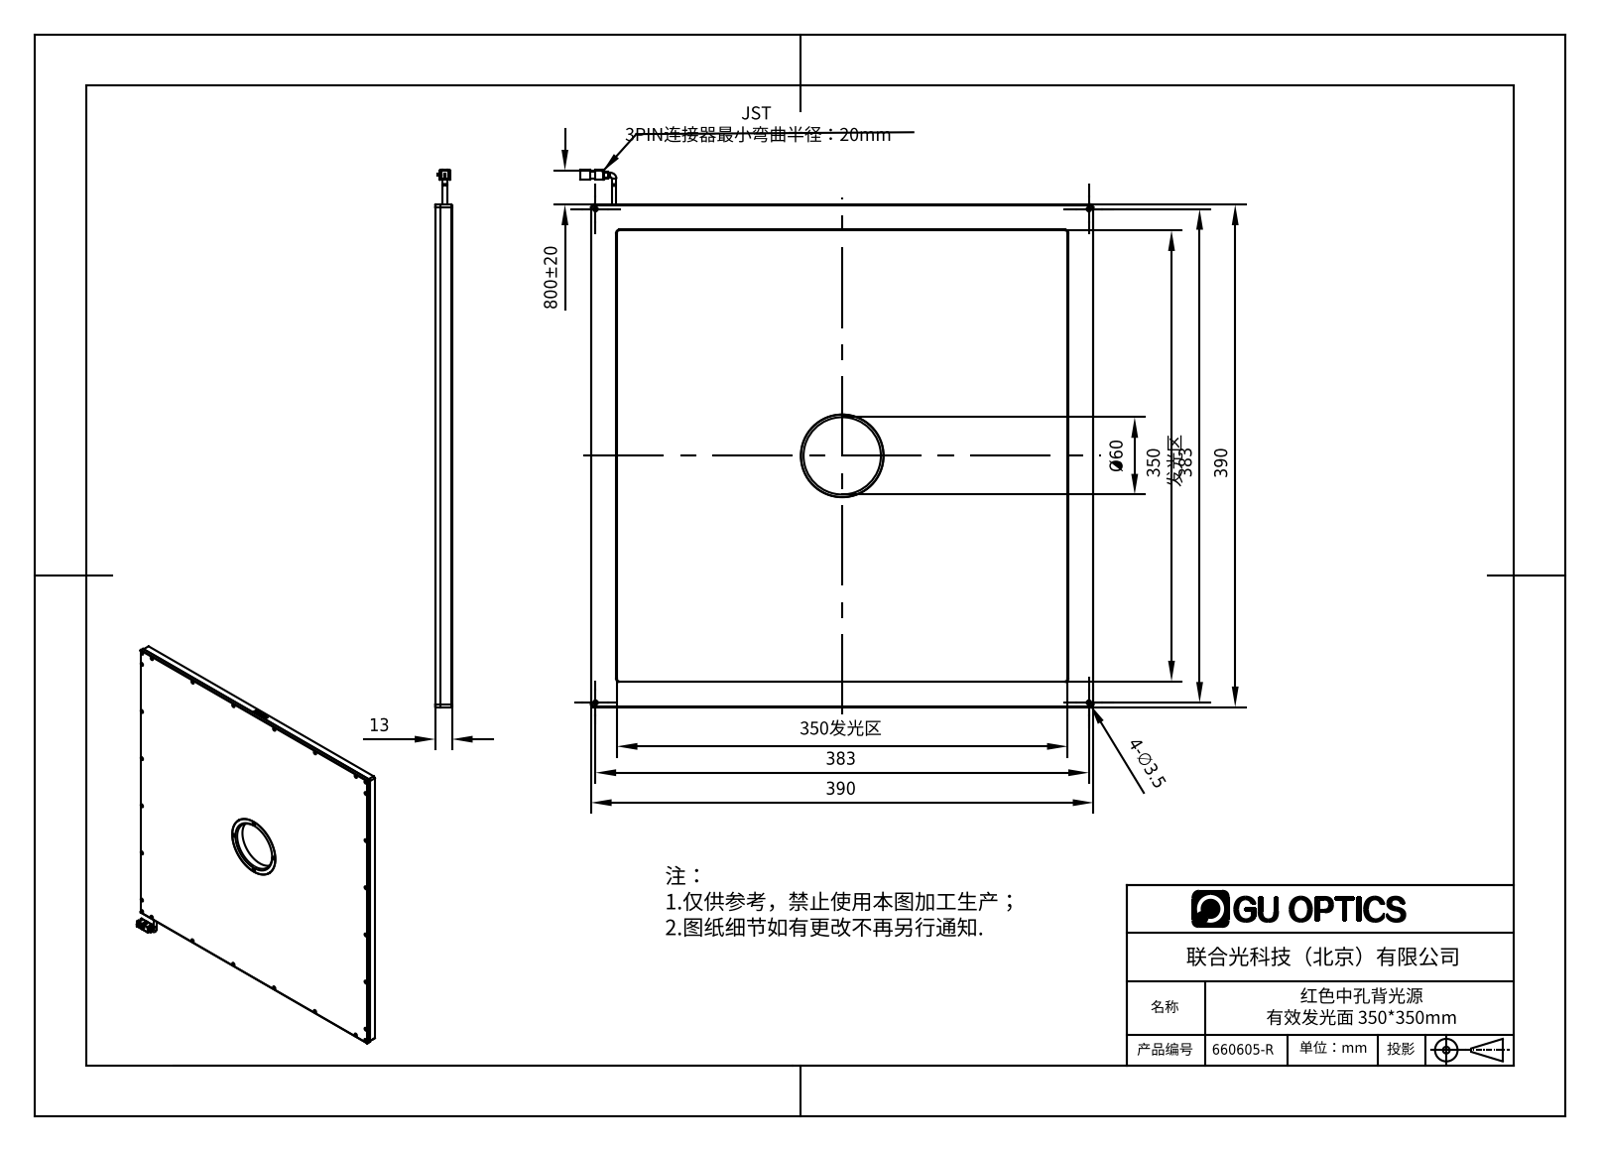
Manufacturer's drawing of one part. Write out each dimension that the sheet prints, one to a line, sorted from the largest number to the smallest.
800±20
390
390
383
383
350 发光区
350发光区
Ø60
13
4-∅3.5
